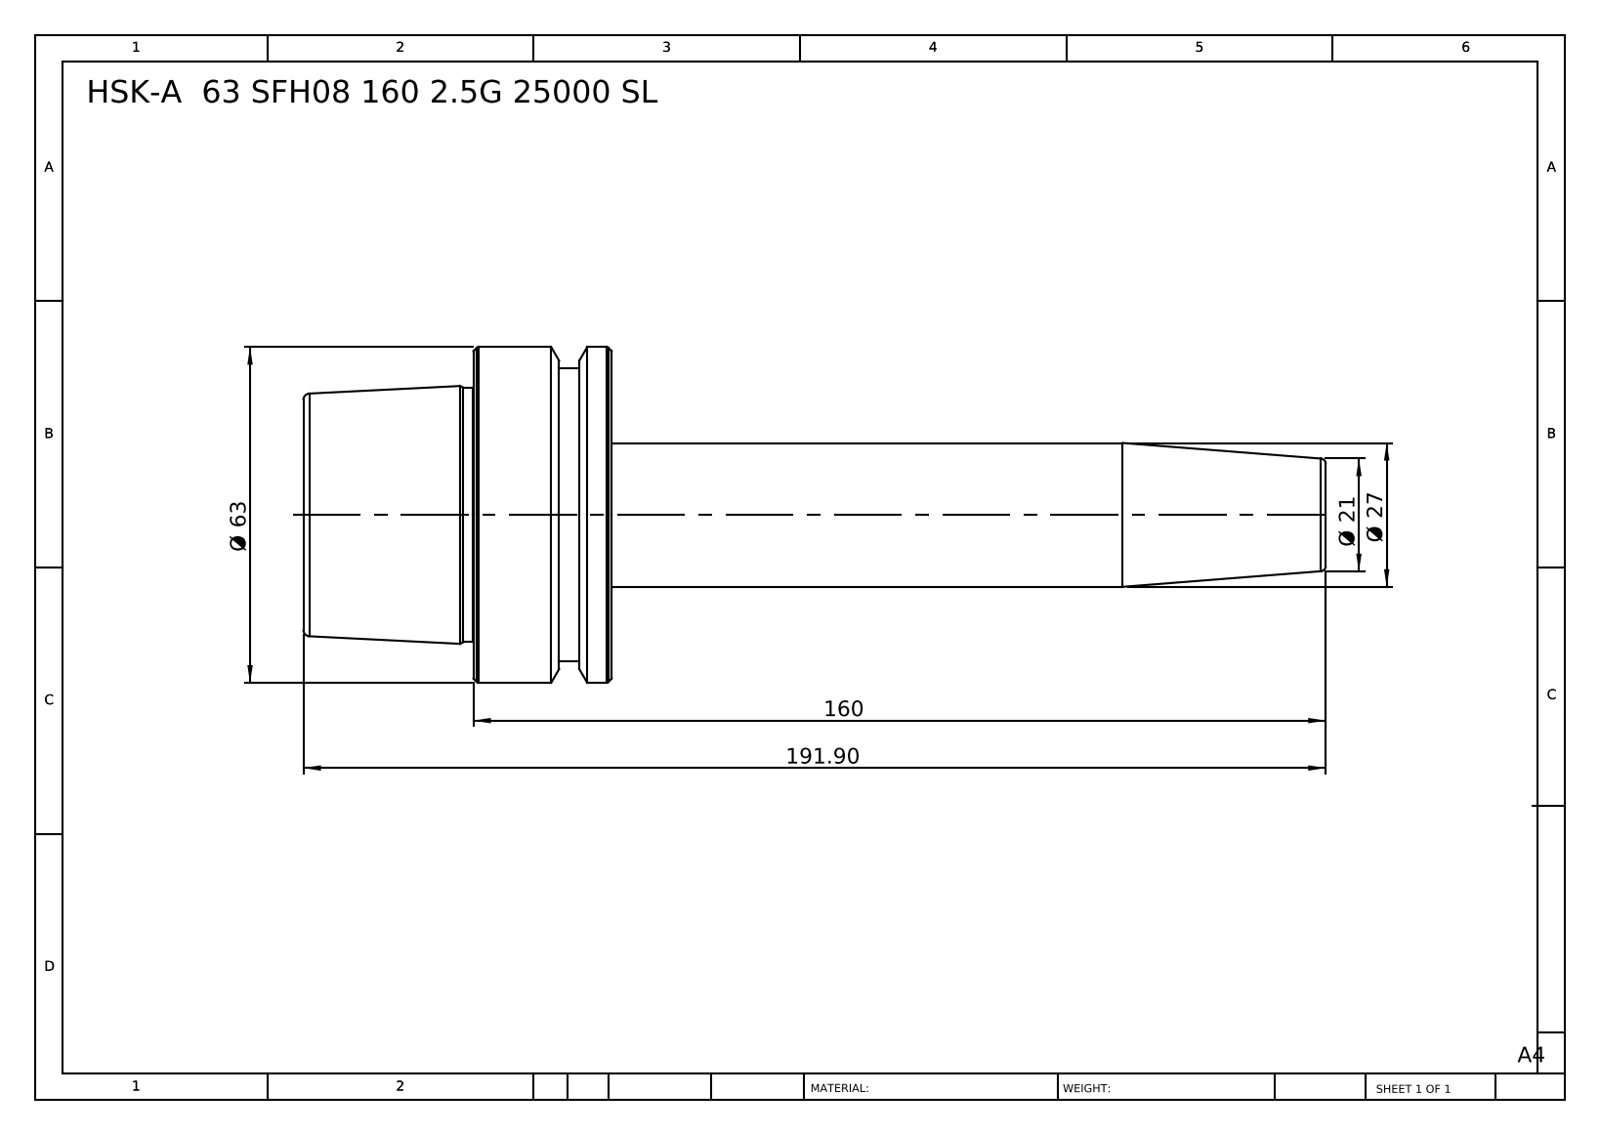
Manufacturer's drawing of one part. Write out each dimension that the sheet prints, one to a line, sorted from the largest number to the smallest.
191.90
160
Ø 63
Ø 27
Ø 21
